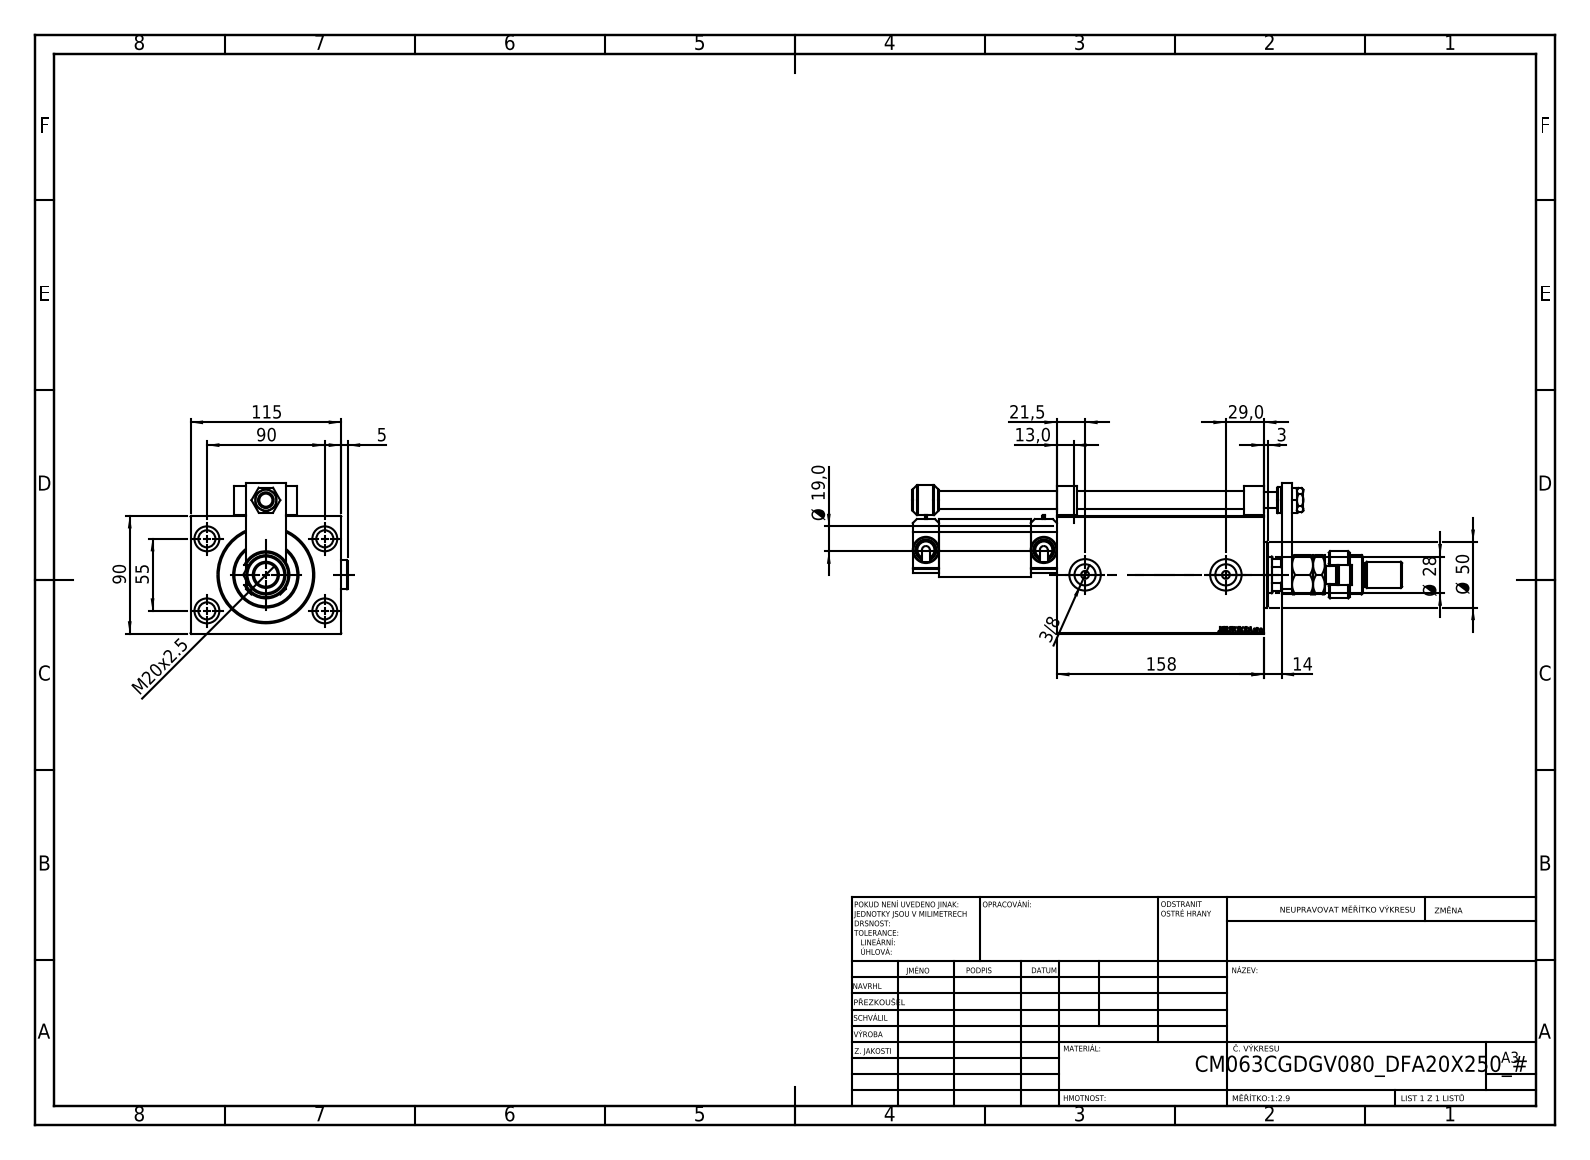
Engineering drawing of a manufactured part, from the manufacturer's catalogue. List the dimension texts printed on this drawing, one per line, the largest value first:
158
115
90
90
55
Ø 50
29,0
Ø 28
21,5
M20x2.5
Ø 19,0
14
13,0
5
3
3/8
